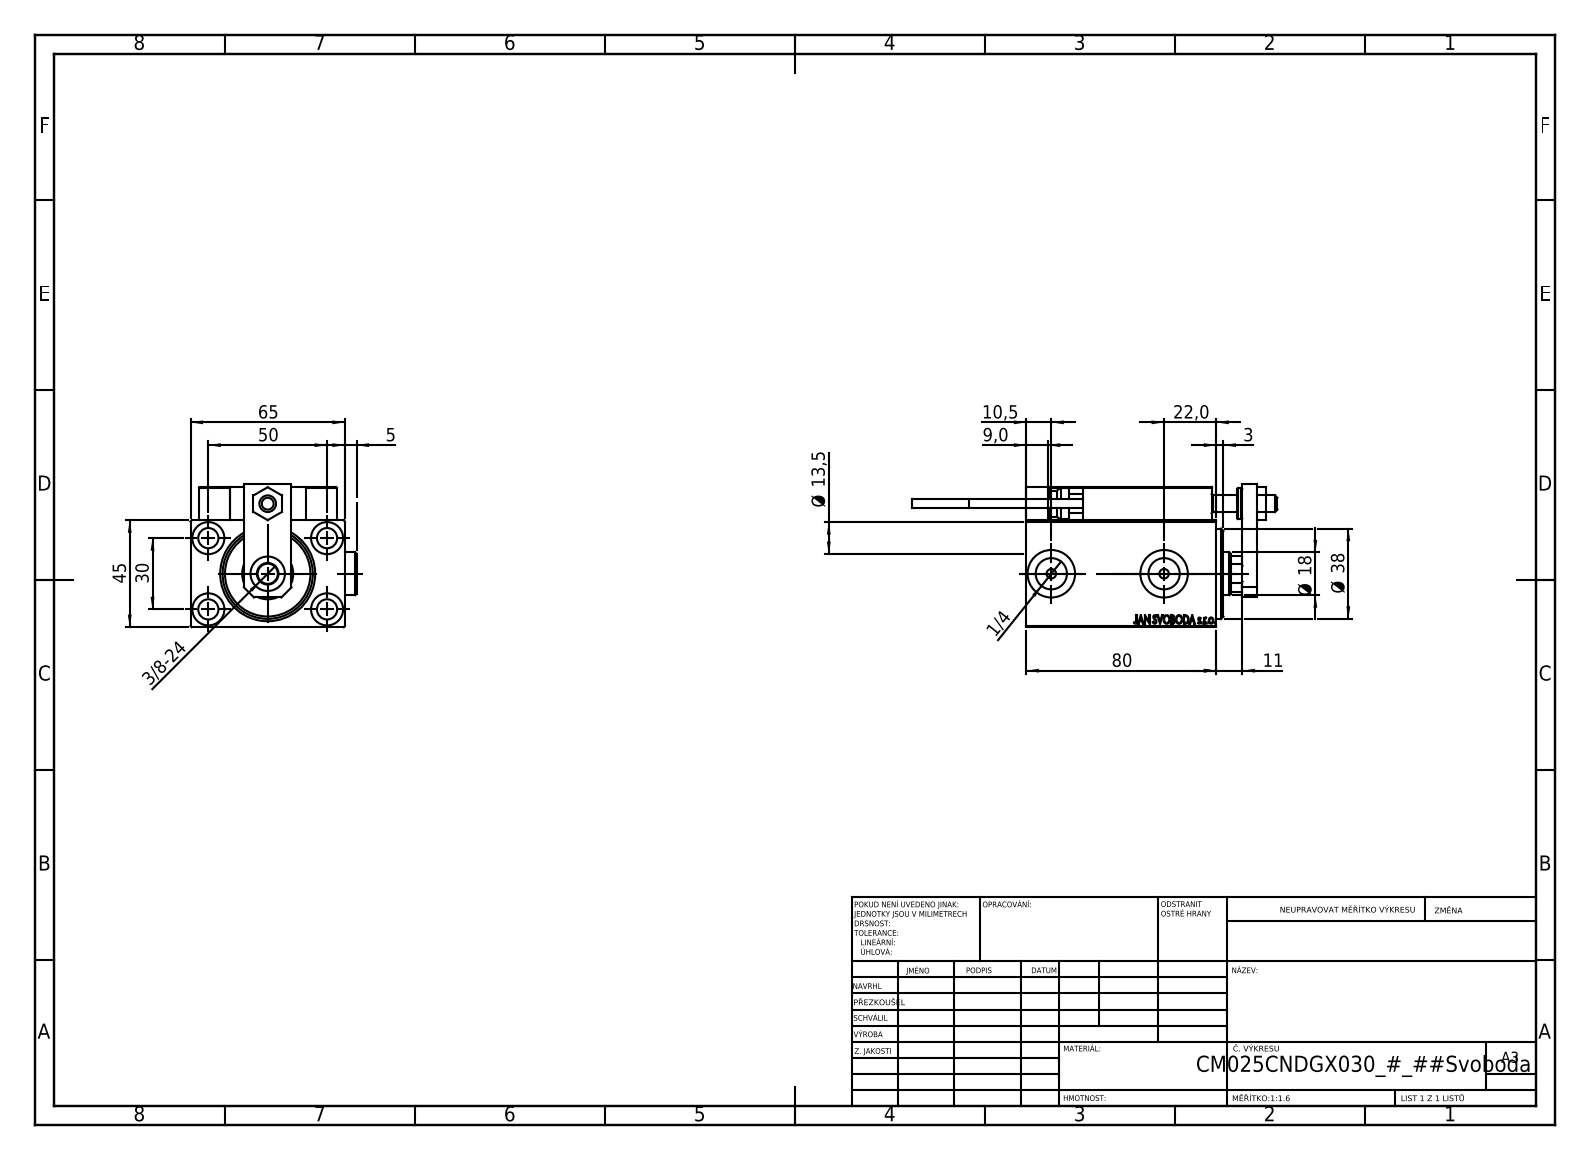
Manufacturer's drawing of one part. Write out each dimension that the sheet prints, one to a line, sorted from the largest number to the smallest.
80
65
50
45
Ø 38
30
22,0
Ø 18
Ø 13,5
11
10,5
9,0
5
3
3/8-24
1/4
